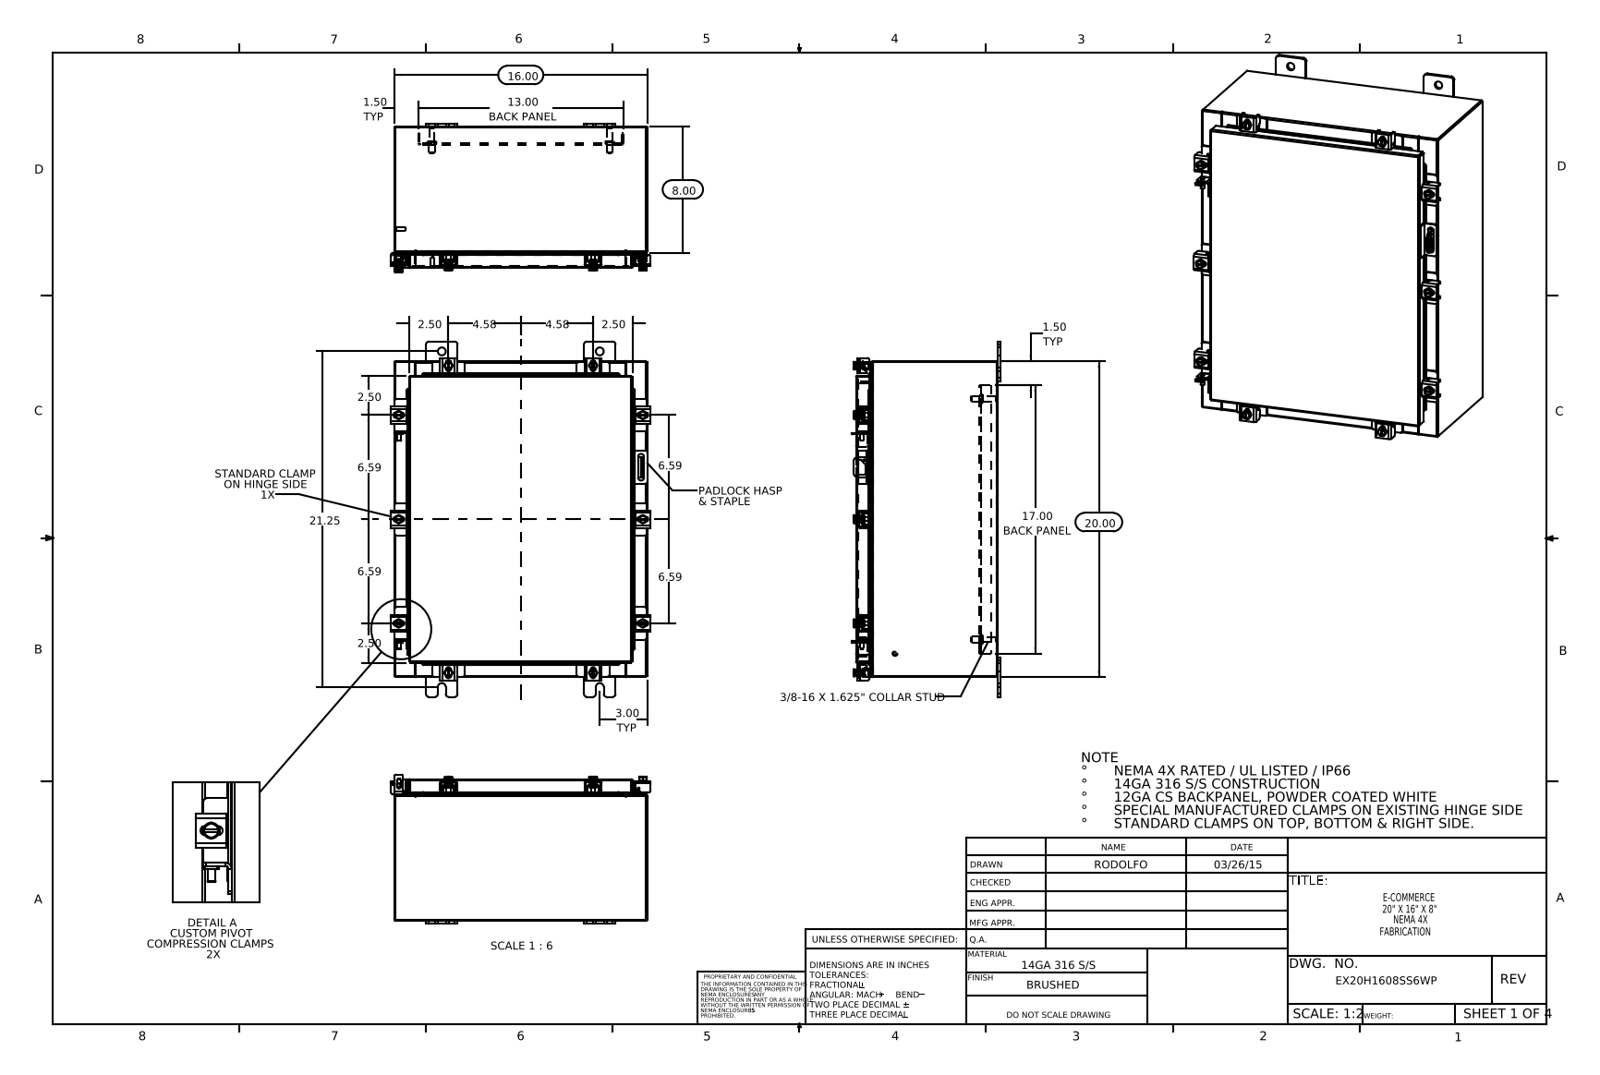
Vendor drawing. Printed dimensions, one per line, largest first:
21.25
20.00
17.00 BACK PANEL
16.00
13.00 BACK PANEL
8.00
6.59
6.59
6.59
6.59
4.58
4.58
3.00 TYP
2.50
2.50
2.50
2.50
1.50 TYP
1.50 TYP
